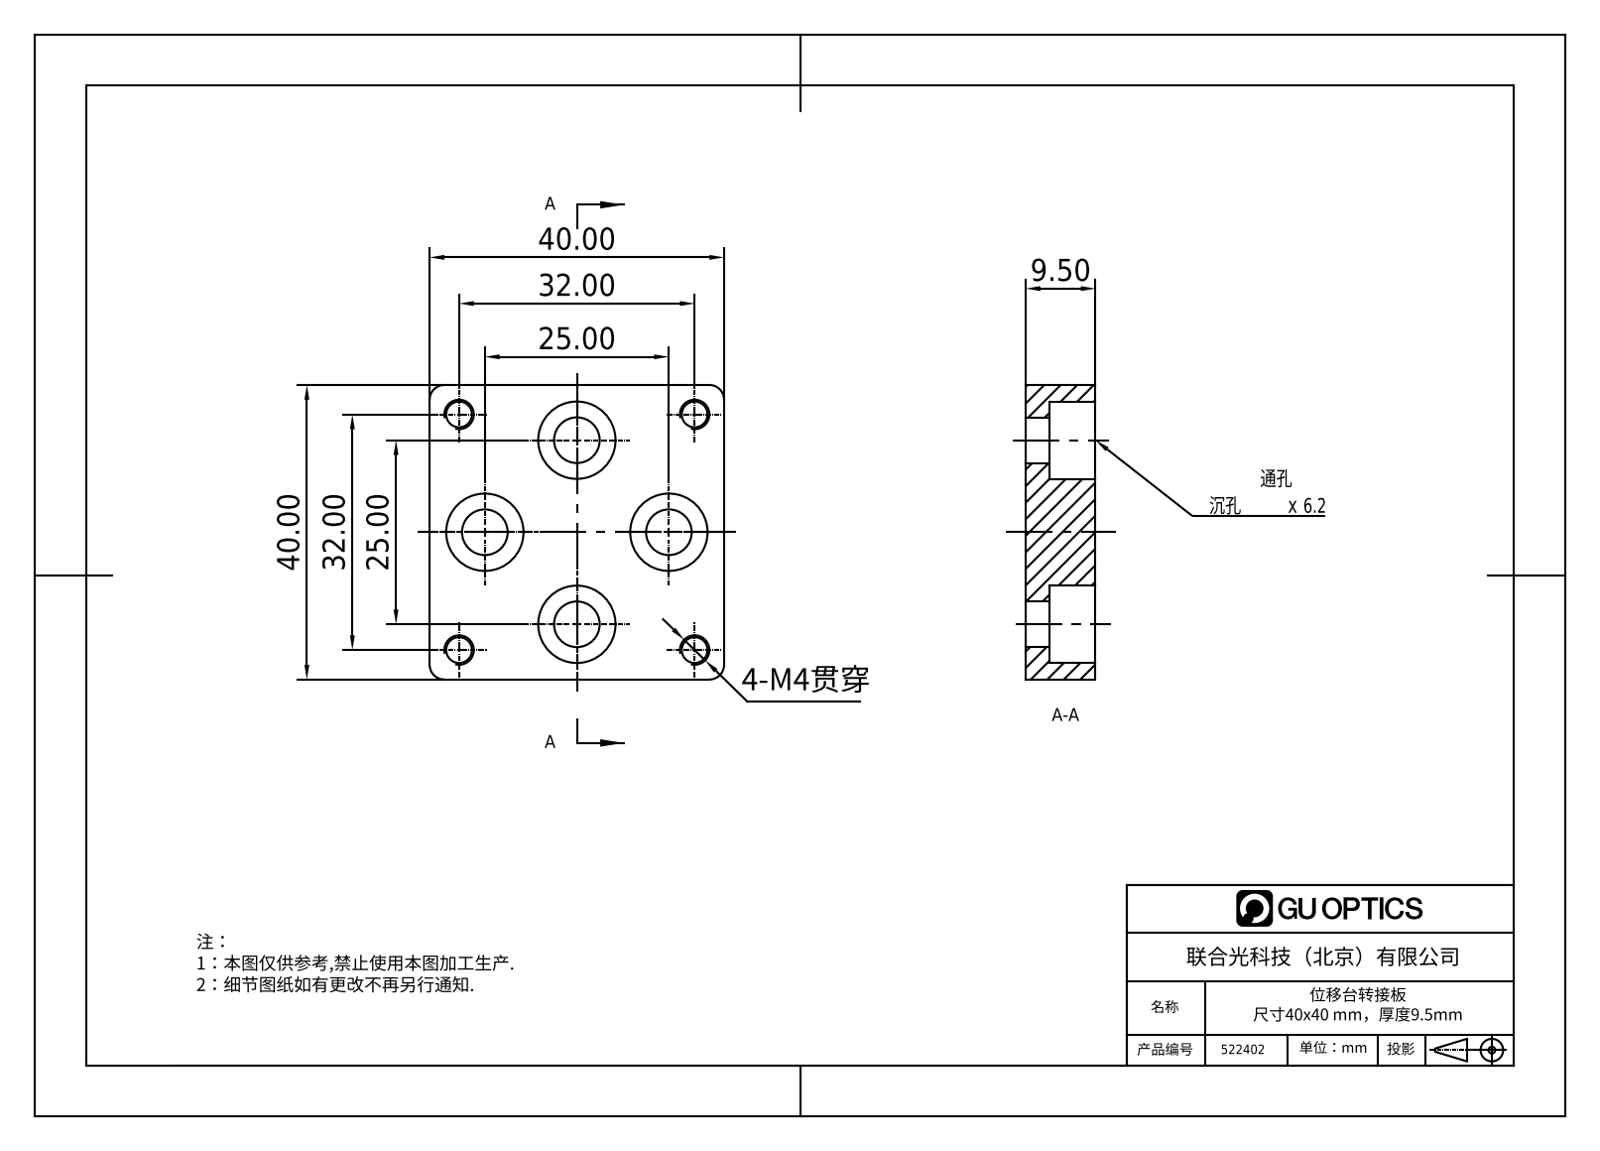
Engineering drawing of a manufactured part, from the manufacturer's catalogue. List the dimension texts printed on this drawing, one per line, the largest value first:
40.00
40.00
32.00
32.00
25.00
25.00
9.50
4-M4贯穿
